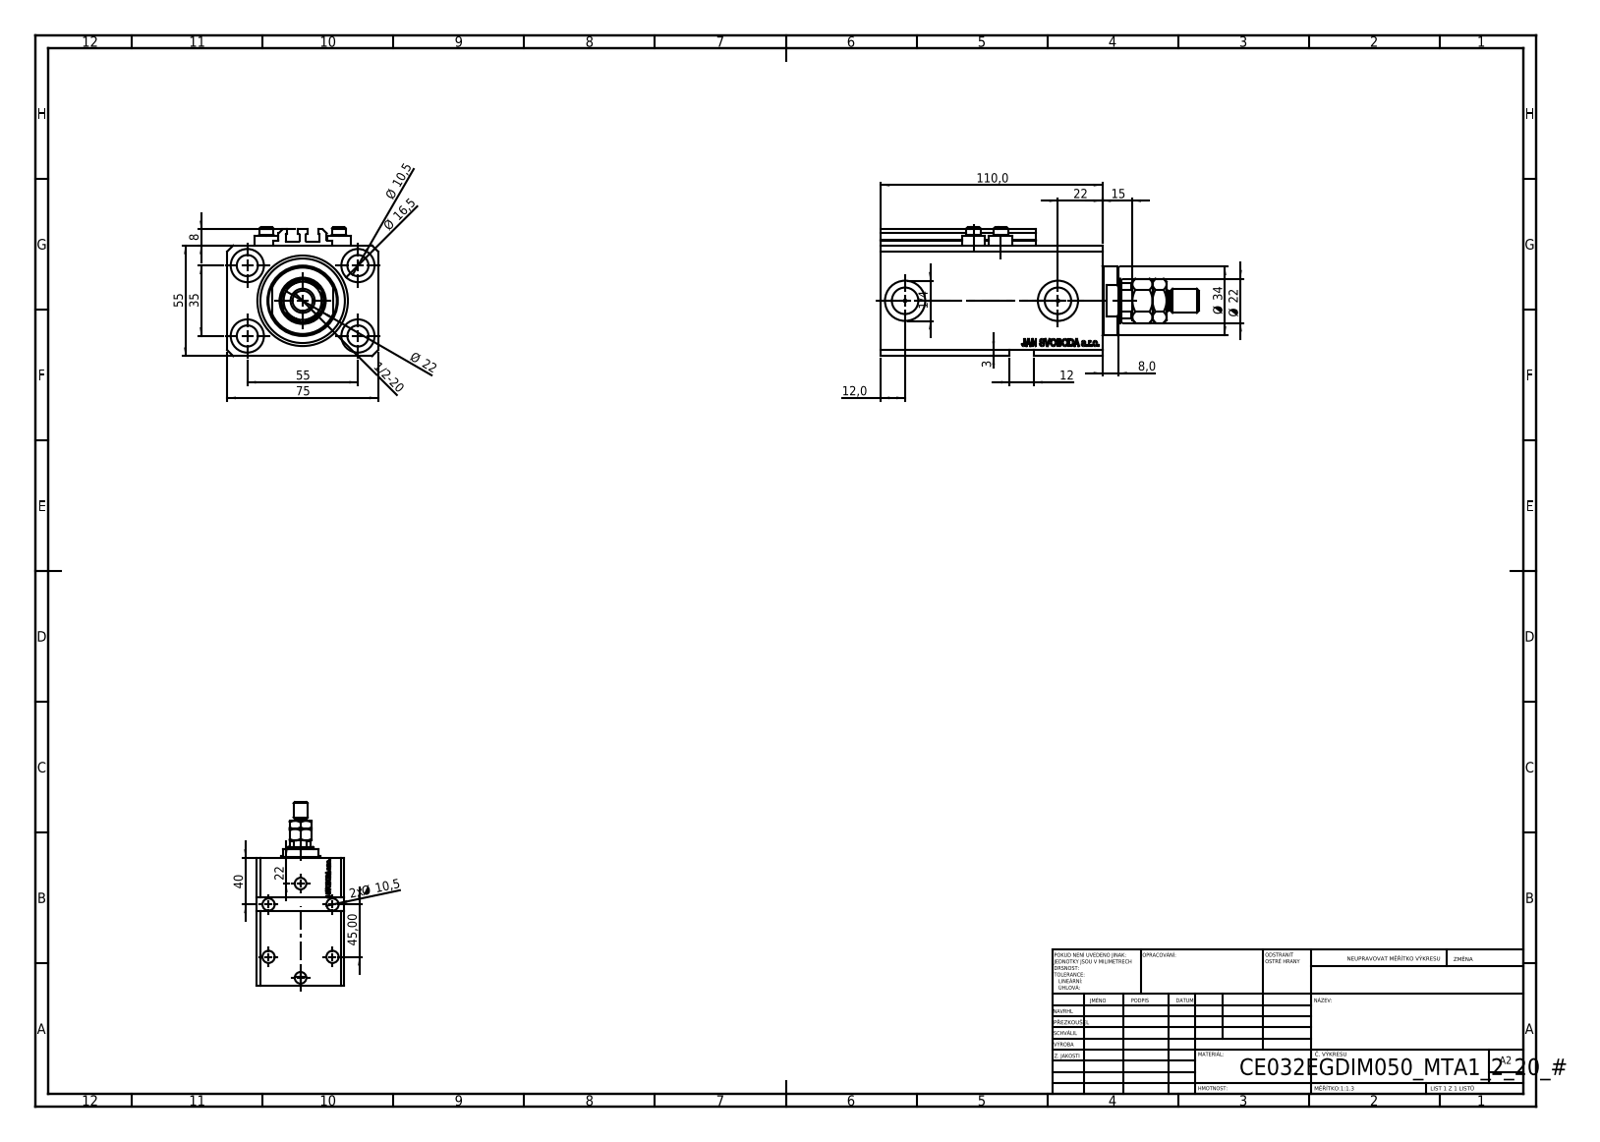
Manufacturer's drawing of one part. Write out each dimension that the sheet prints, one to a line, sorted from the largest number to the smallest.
110,0
75
55
55
45,00
40
35
Ø 34
Ø 22
22
Ø 22
22
Ø 16,5
15
12,0
12
Ø 10,5
2x Ø 10,5
8
8,0
3
1/2-20
1/4
